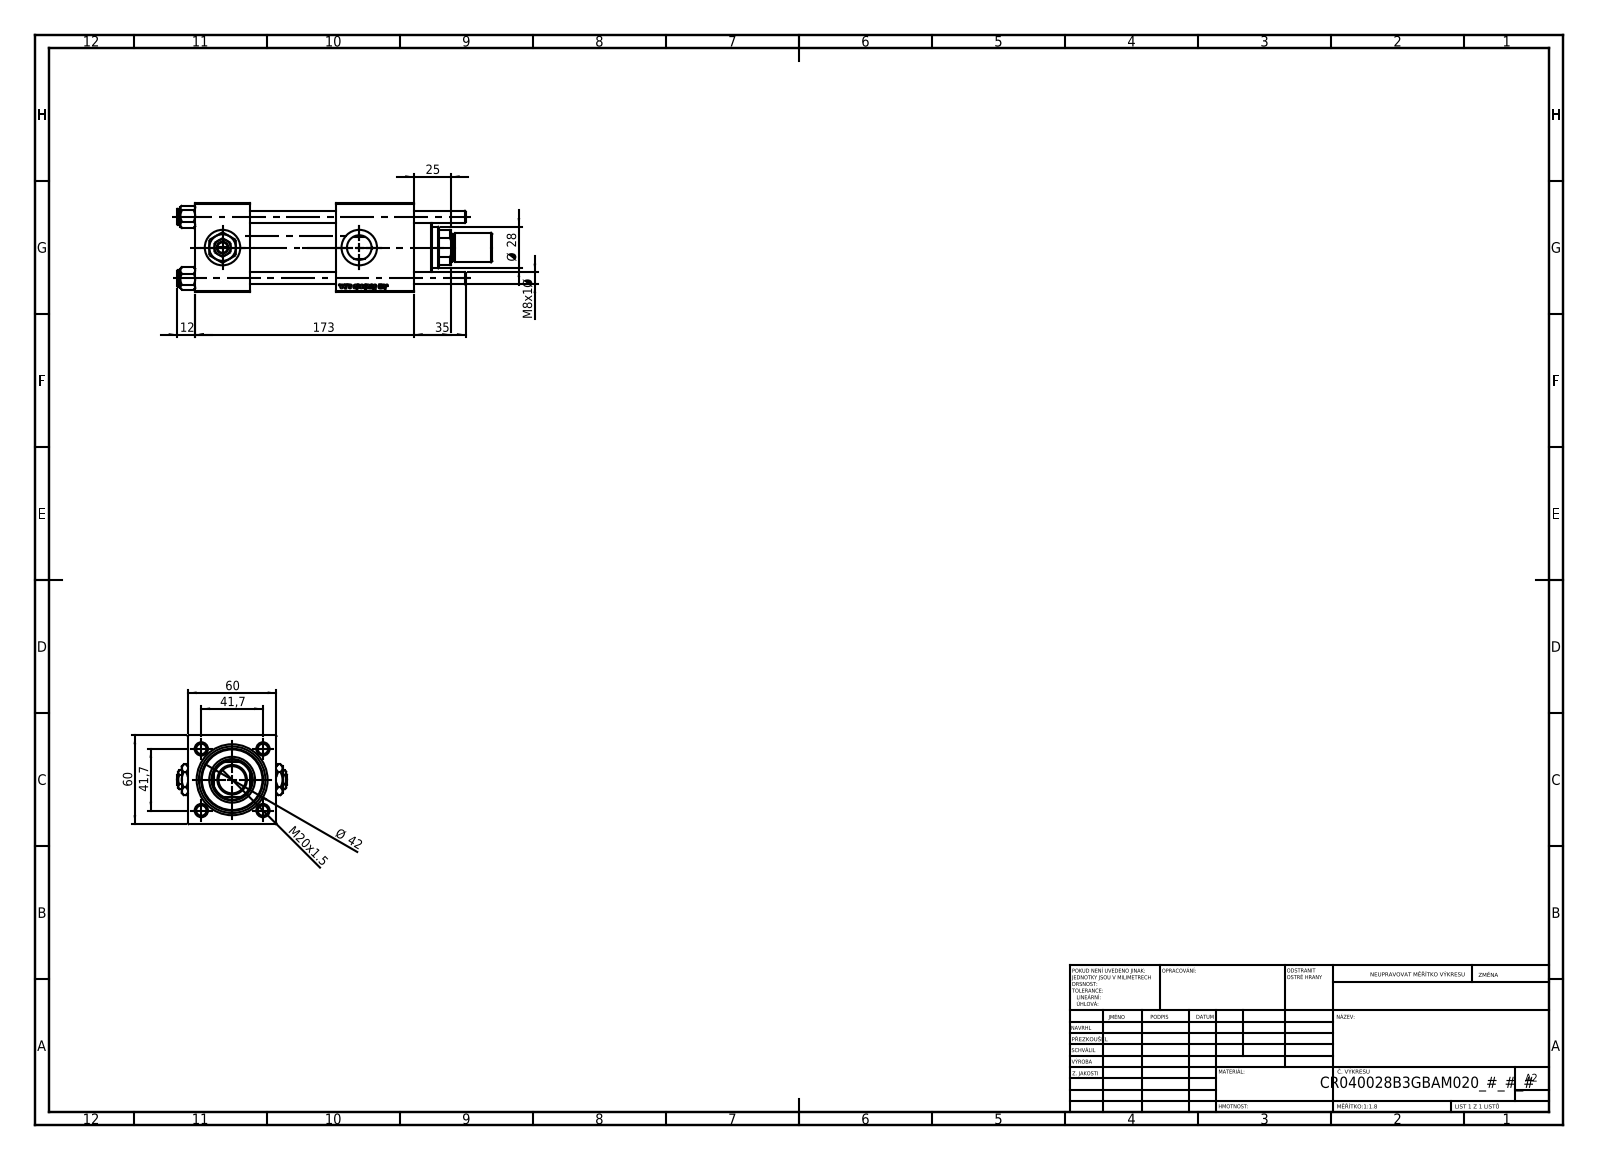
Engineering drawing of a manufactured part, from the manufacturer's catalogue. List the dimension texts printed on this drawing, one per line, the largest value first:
173
60
60
Ø 42
41,7
41,7
35
Ø 28
25
M20x1.5
12
M8x1 Ø
